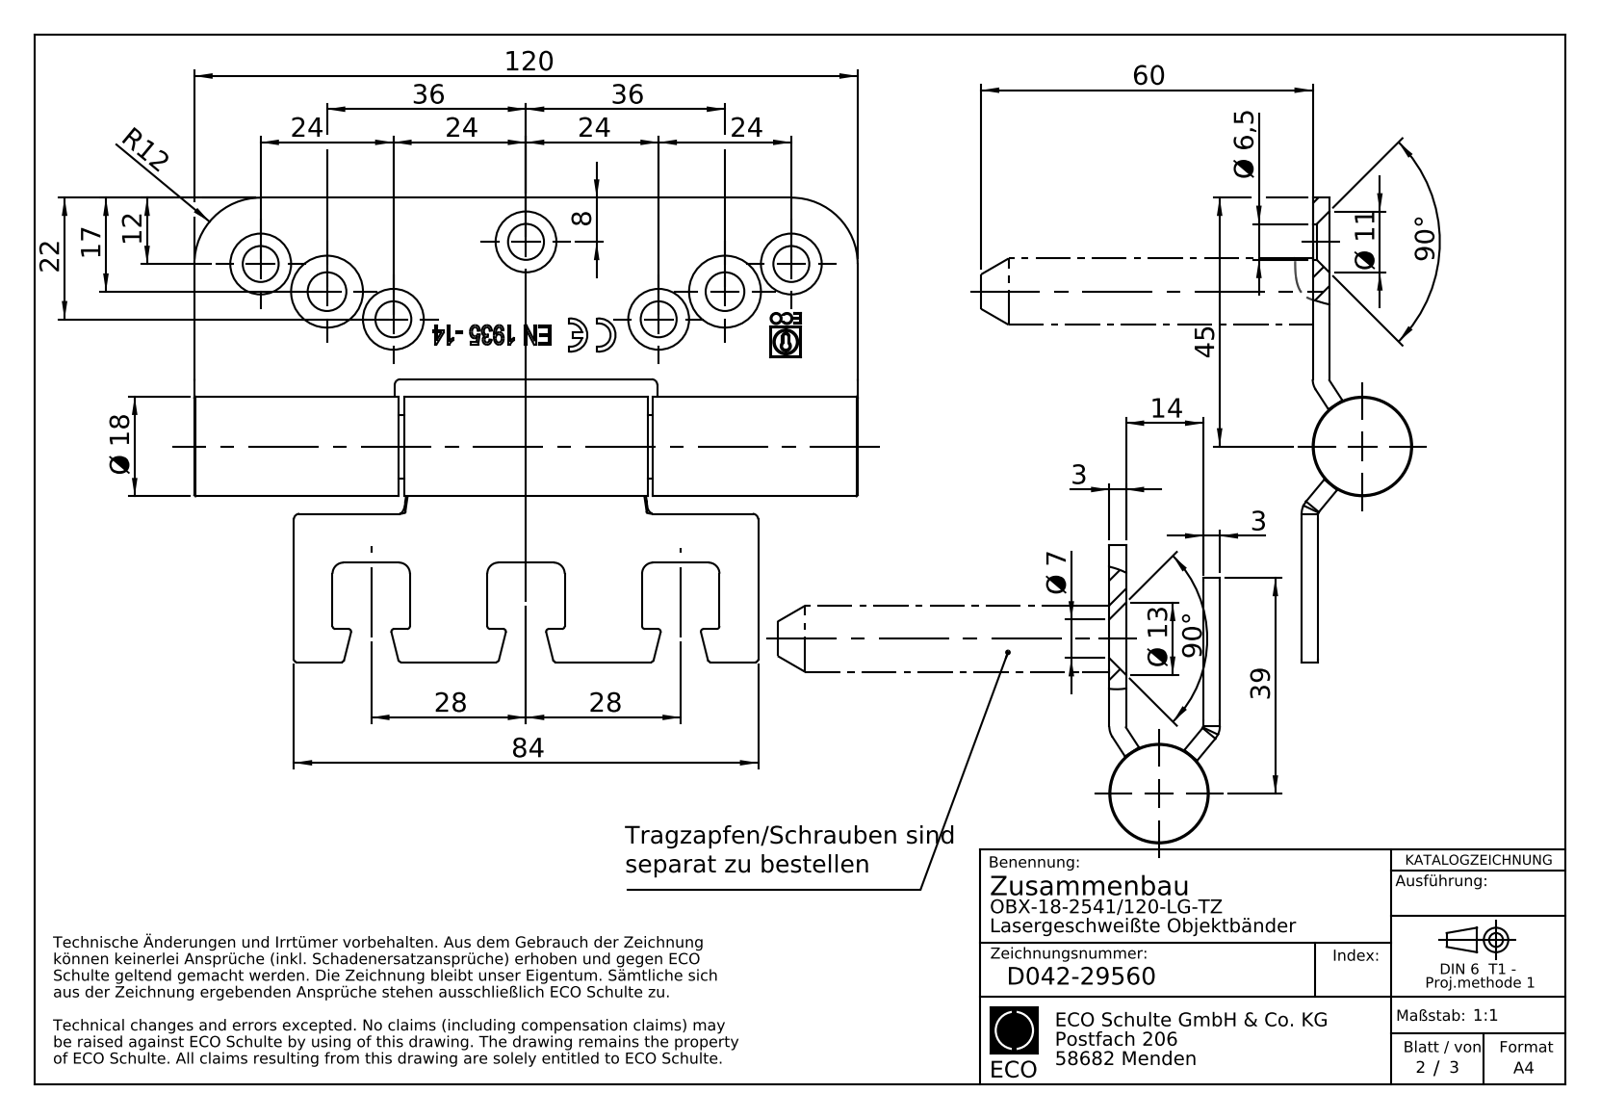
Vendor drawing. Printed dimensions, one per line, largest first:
120
90°
90°
84
60
45
39
36
36
28
28
24
24
24
24
22
Ø 18
17
14
Ø 13
R12
12
Ø 11
8
Ø 7
Ø 6,5
3
3
